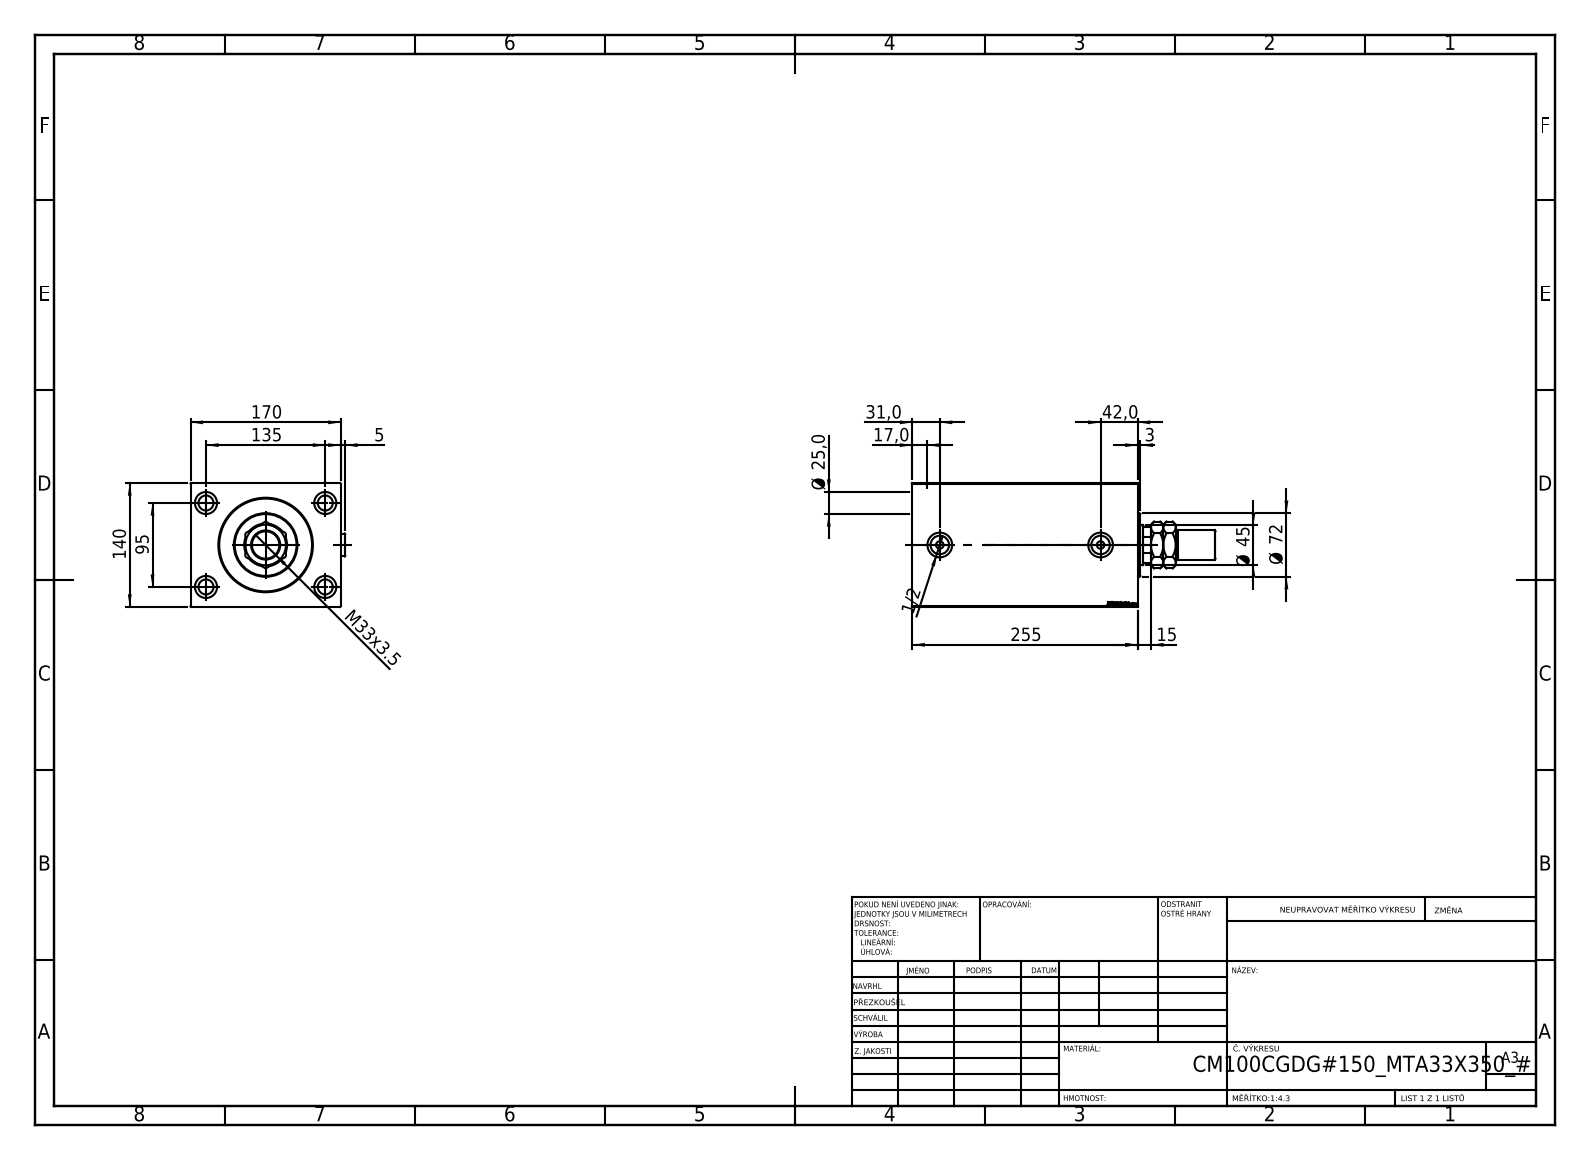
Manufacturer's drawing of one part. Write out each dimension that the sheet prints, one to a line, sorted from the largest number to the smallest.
255
170
140
135
95
Ø 72
Ø 45
42,0
M33x3.5
31,0
Ø 25,0
17,0
15
5
3
1/2
